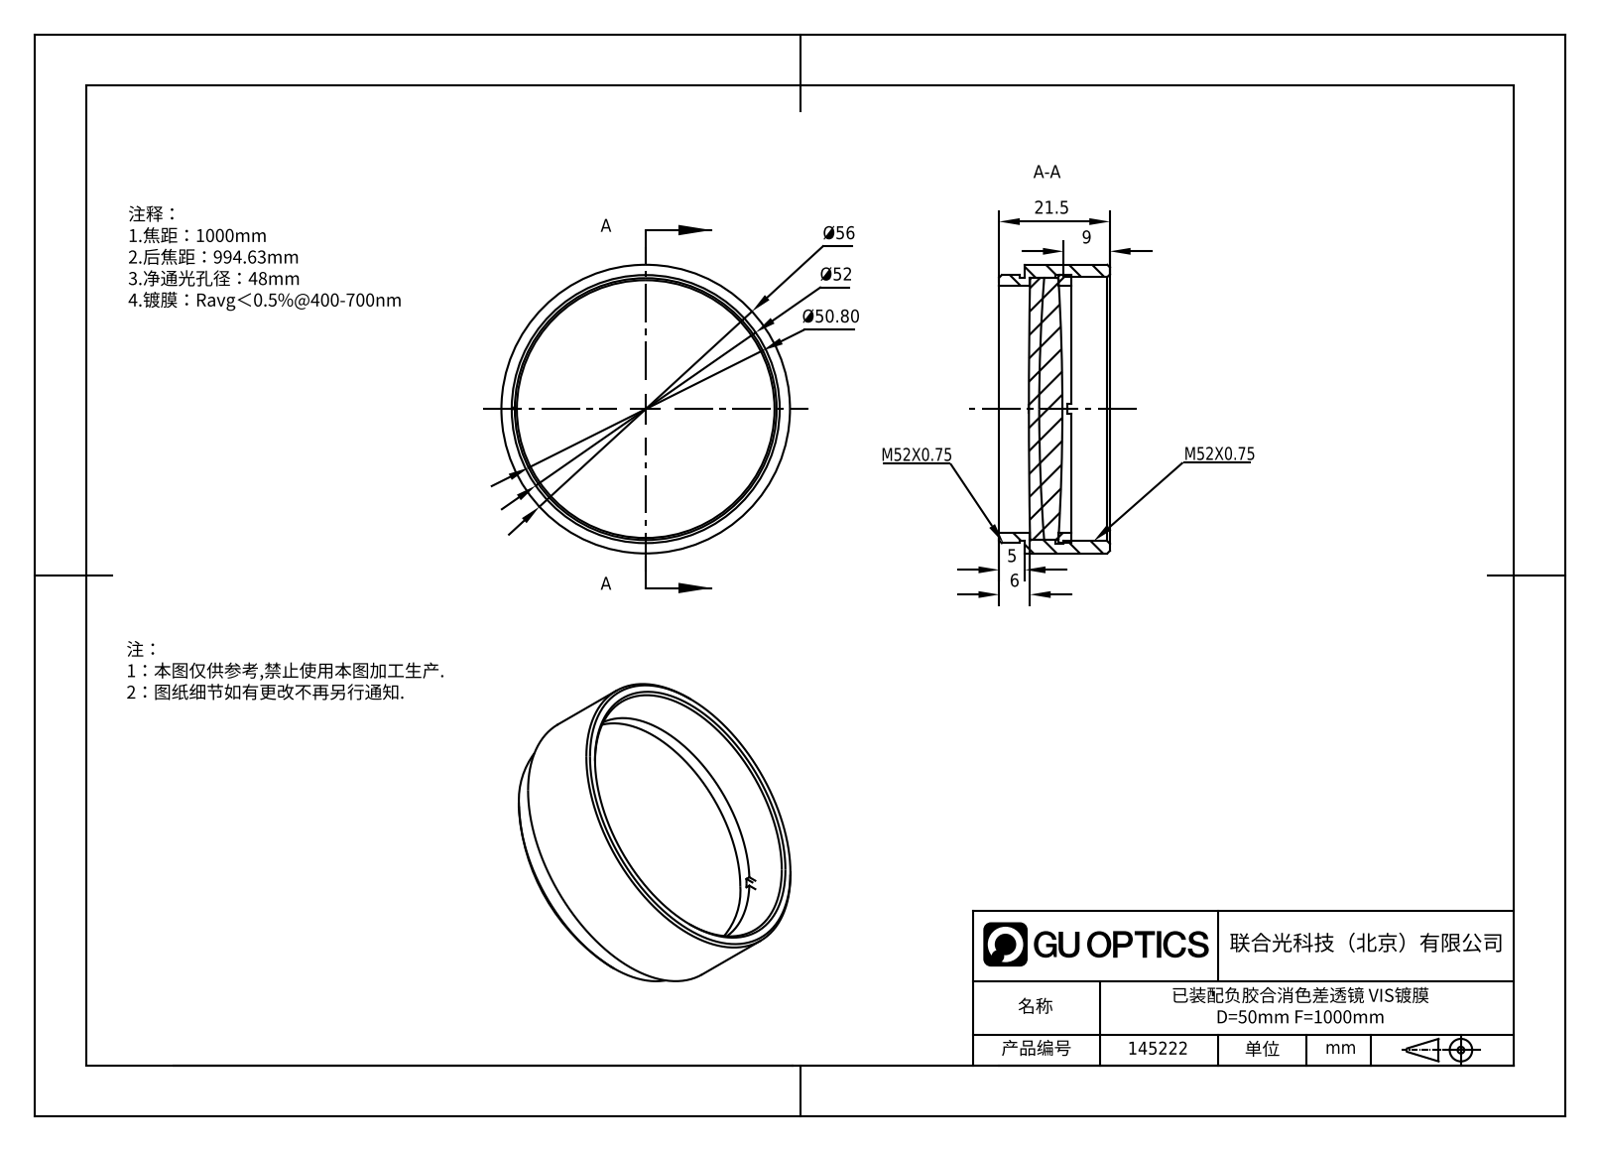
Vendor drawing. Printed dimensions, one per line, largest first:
Ø56
Ø52
Ø50.80
21.5
9
6
5
